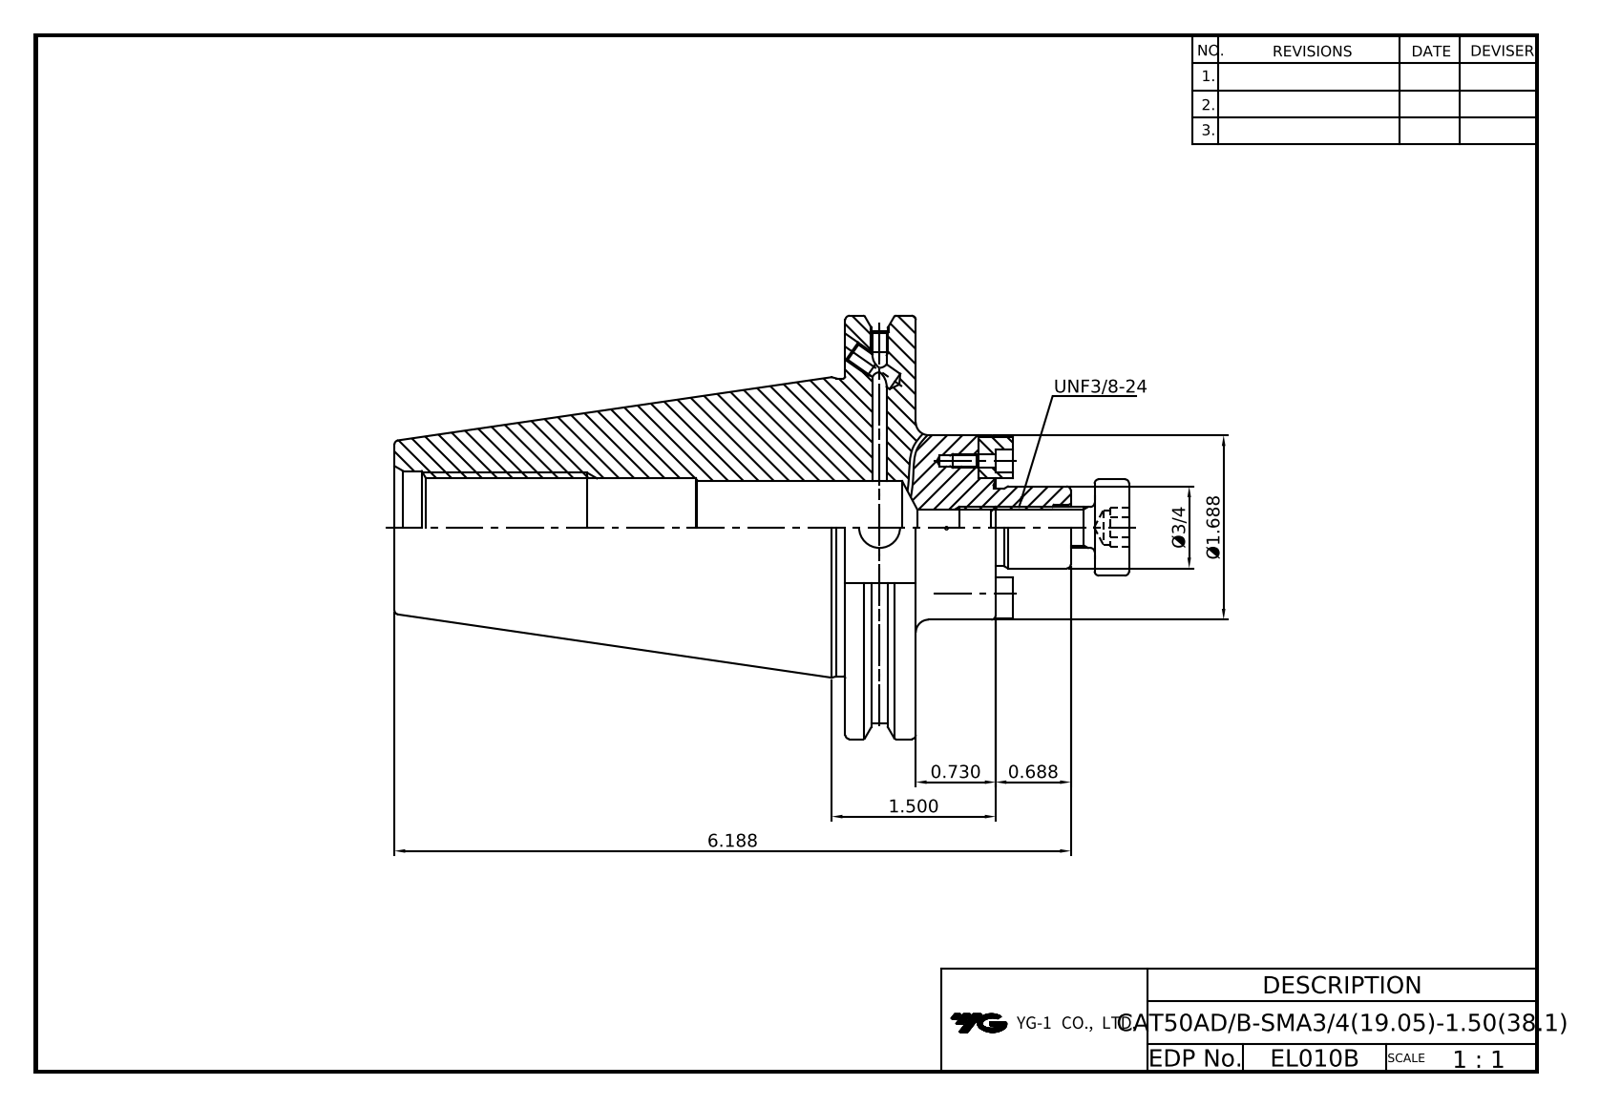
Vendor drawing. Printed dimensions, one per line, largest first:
6.188
Ø1.688
1.500
Ø3/4
0.730
0.688
